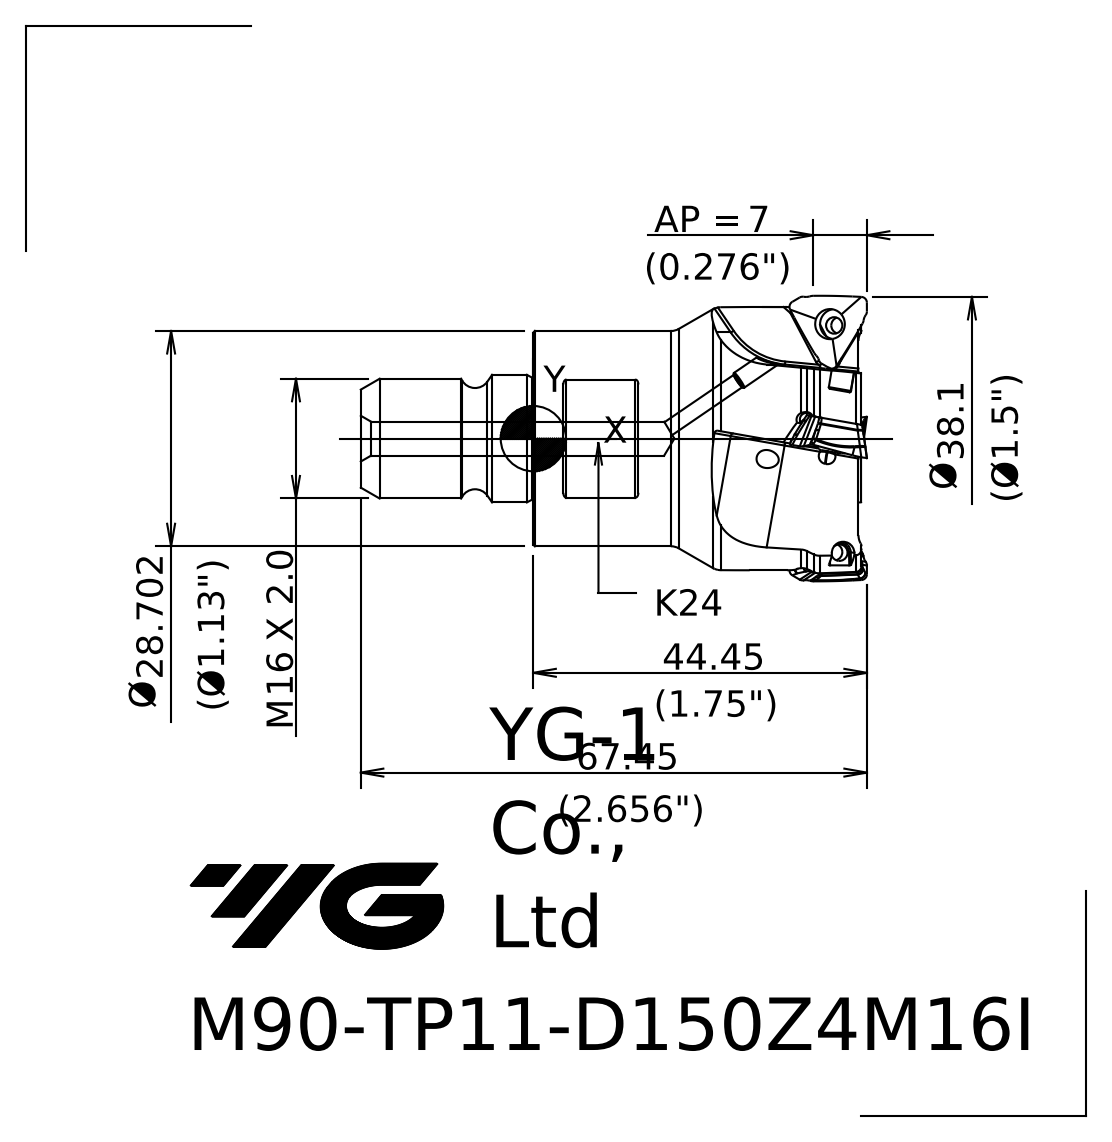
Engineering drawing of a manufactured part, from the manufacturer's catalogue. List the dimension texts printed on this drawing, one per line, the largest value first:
67.45
44.45
38.1 Ø
28.702 Ø
AP = 7
M X 2.0 16
